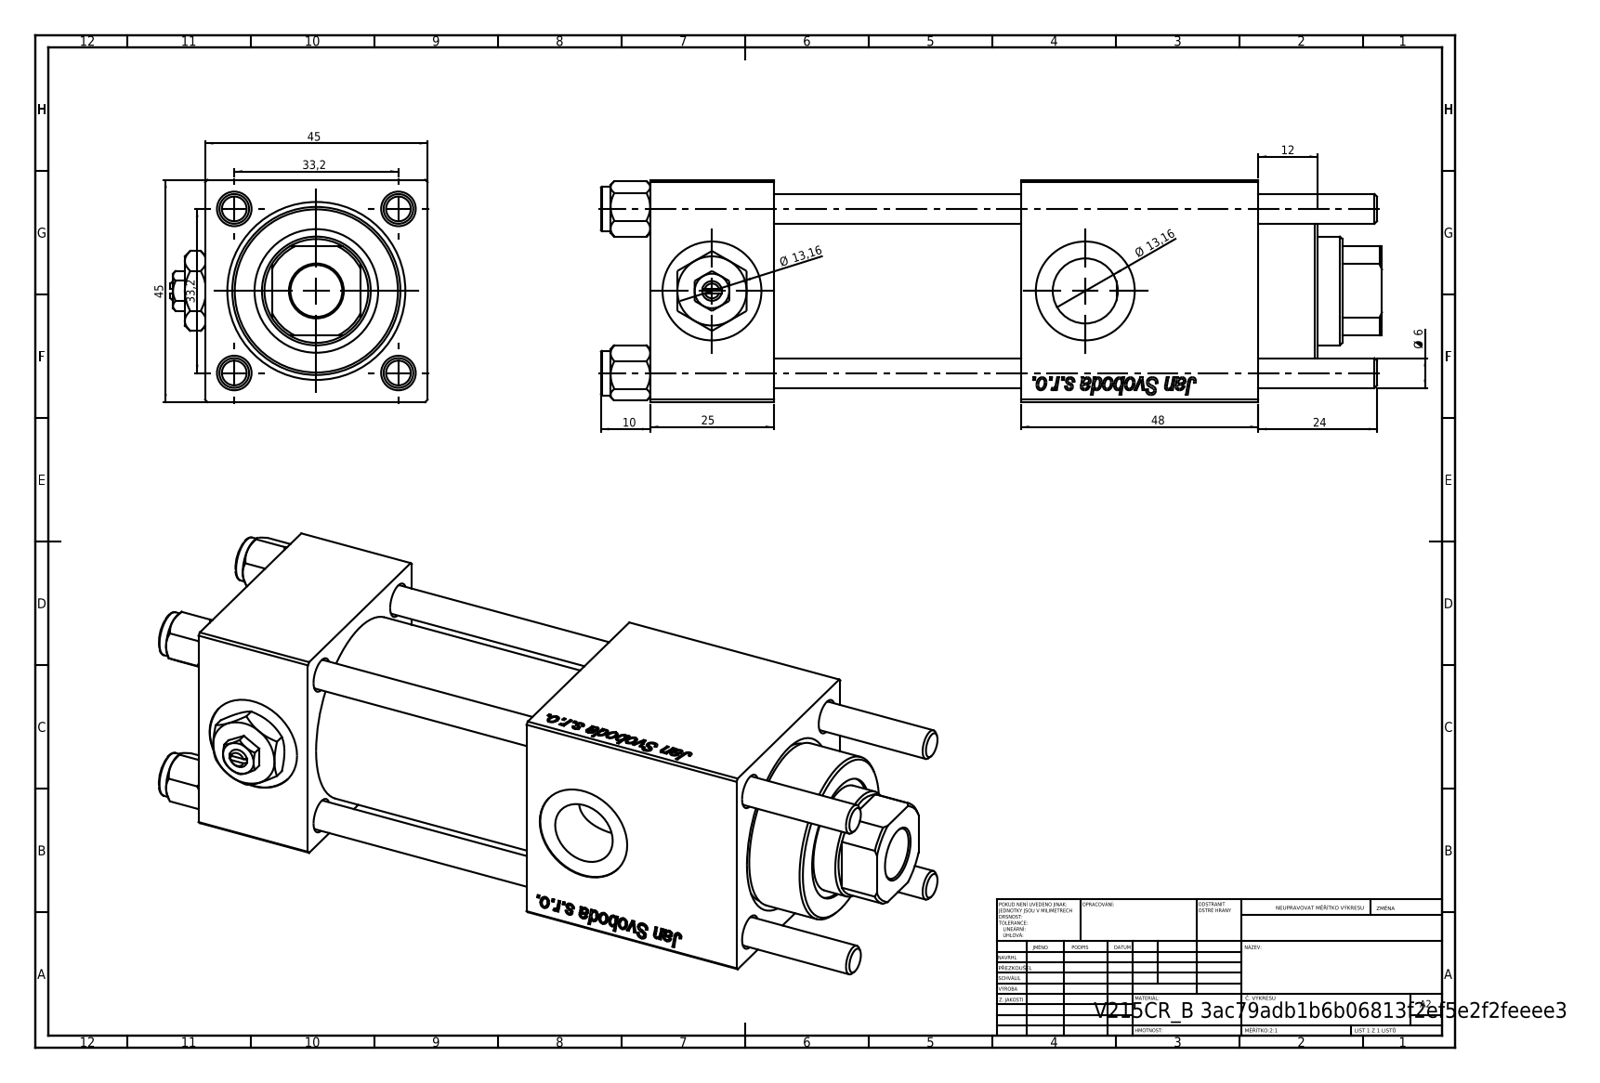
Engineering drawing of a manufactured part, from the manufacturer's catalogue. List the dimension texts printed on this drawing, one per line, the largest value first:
48
45
45
33,2
33,2
25
24
Ø 13,16
Ø 13,16
12
10
Ø 6
